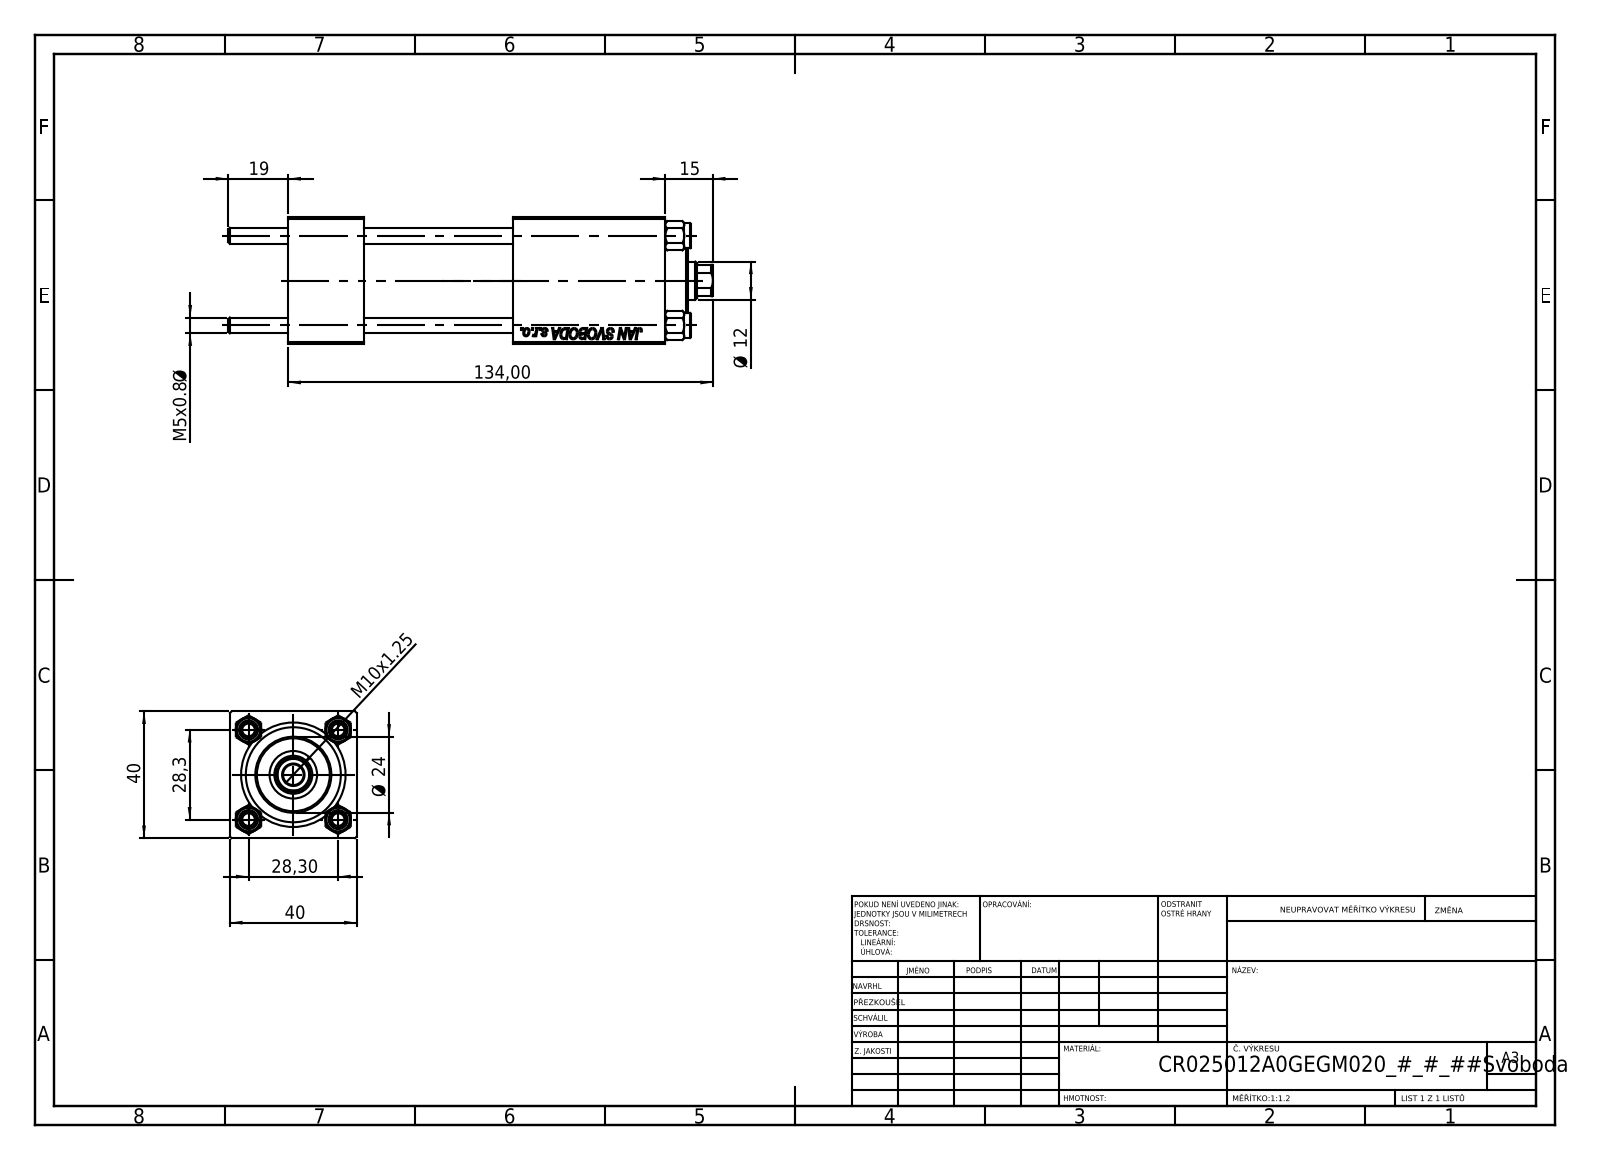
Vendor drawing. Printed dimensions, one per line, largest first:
134,00
40
40
28,3
28,30
Ø 24
19
15
Ø 12
M10x1.25
M5x0.8 Ø
